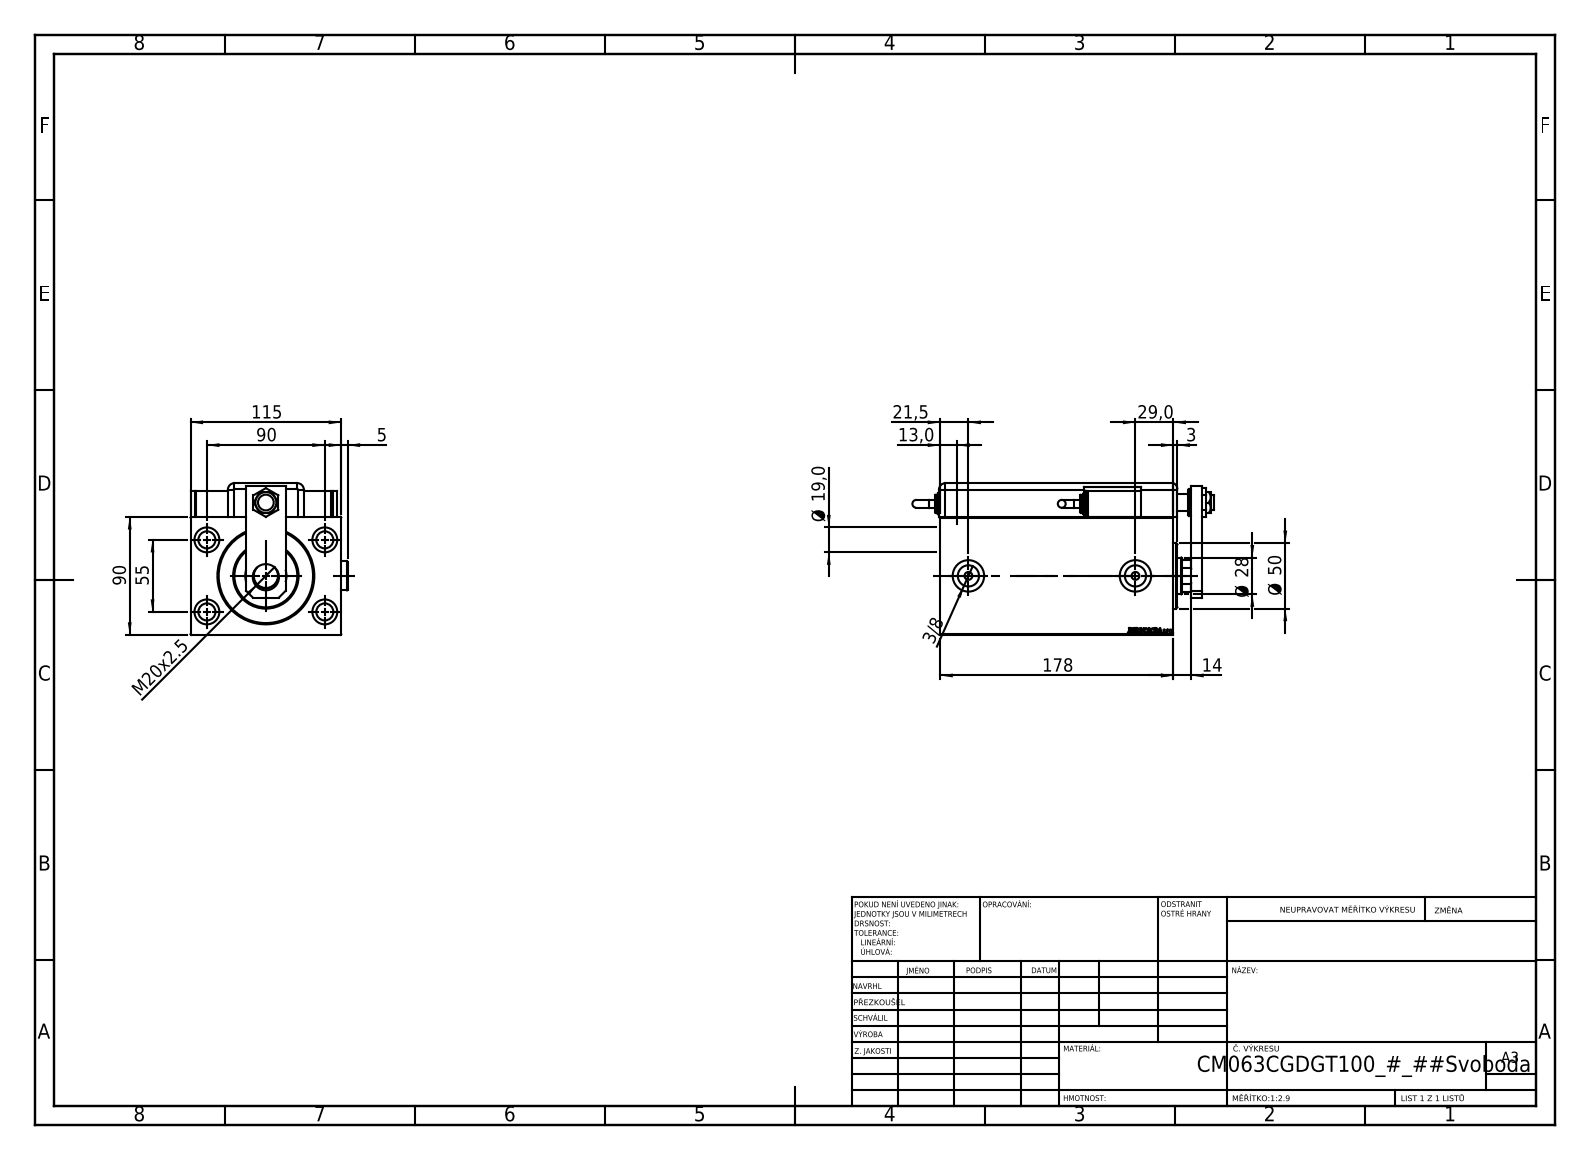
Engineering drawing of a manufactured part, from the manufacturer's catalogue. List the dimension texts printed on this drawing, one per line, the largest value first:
178
115
90
90
55
Ø 50
29,0
Ø 28
21,5
M20x2.5
Ø 19,0
14
13,0
5
3
3/8
